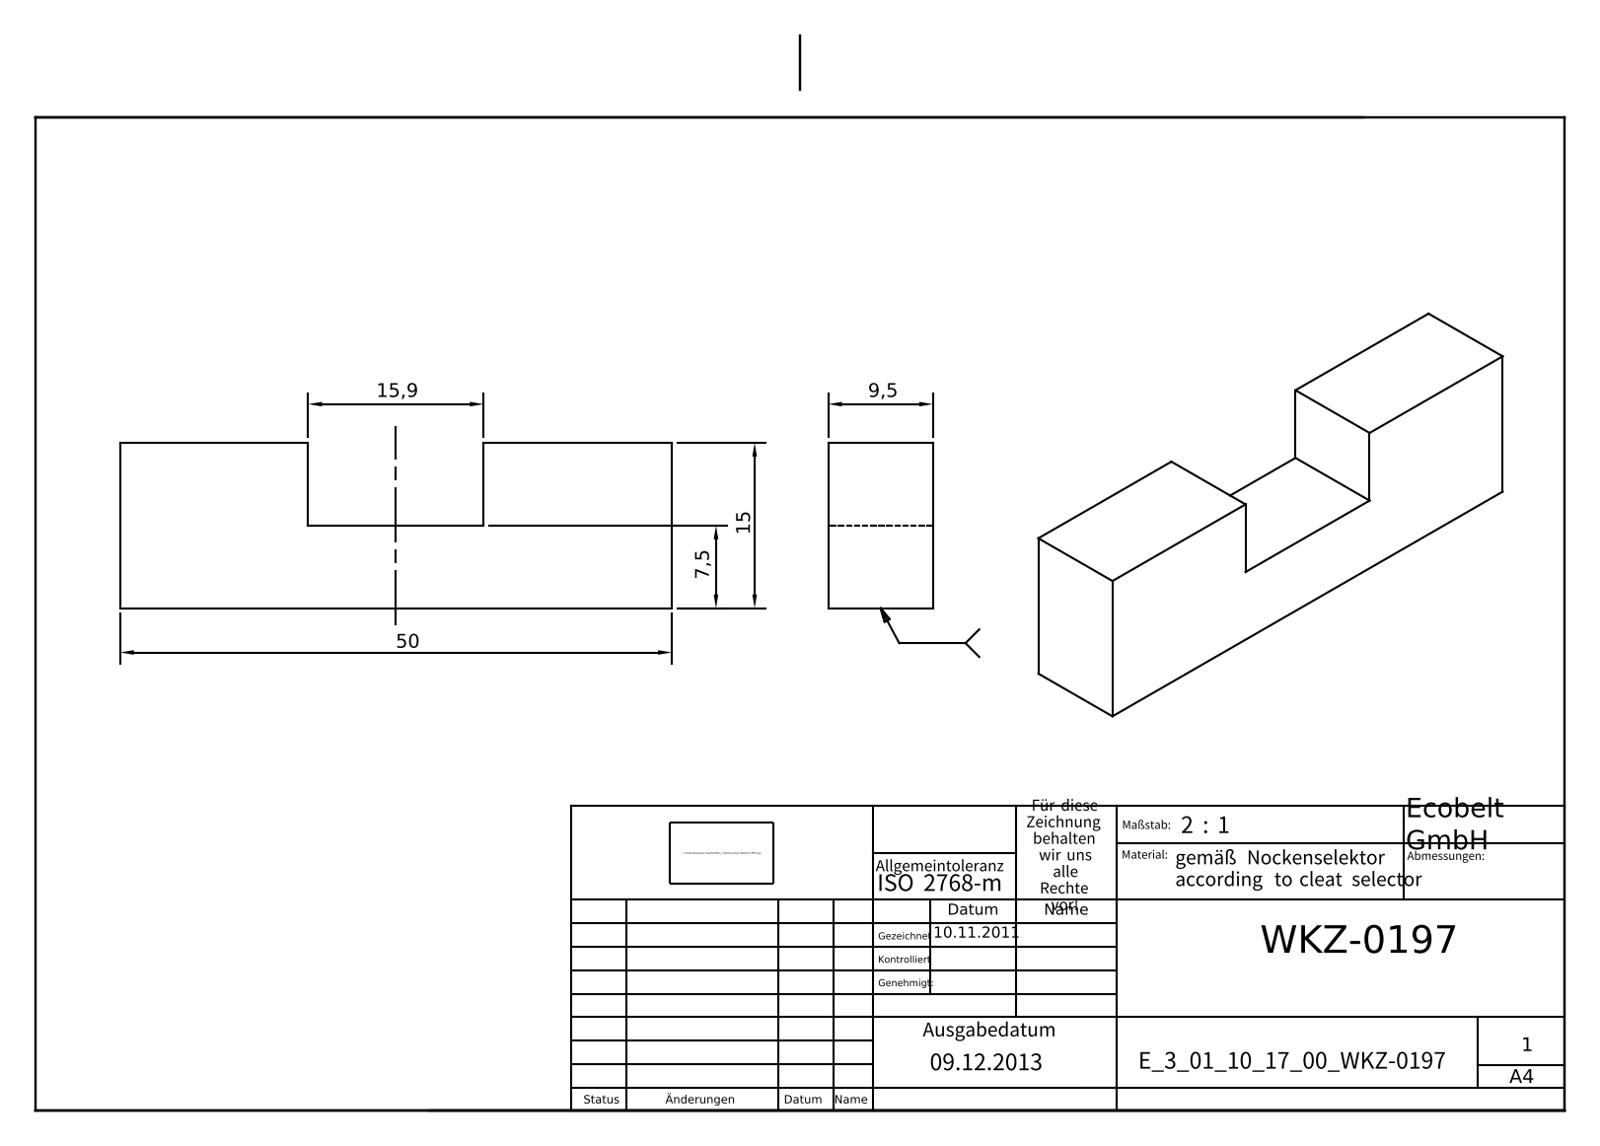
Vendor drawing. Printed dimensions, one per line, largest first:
50
15,9
15
9,5
7,5
